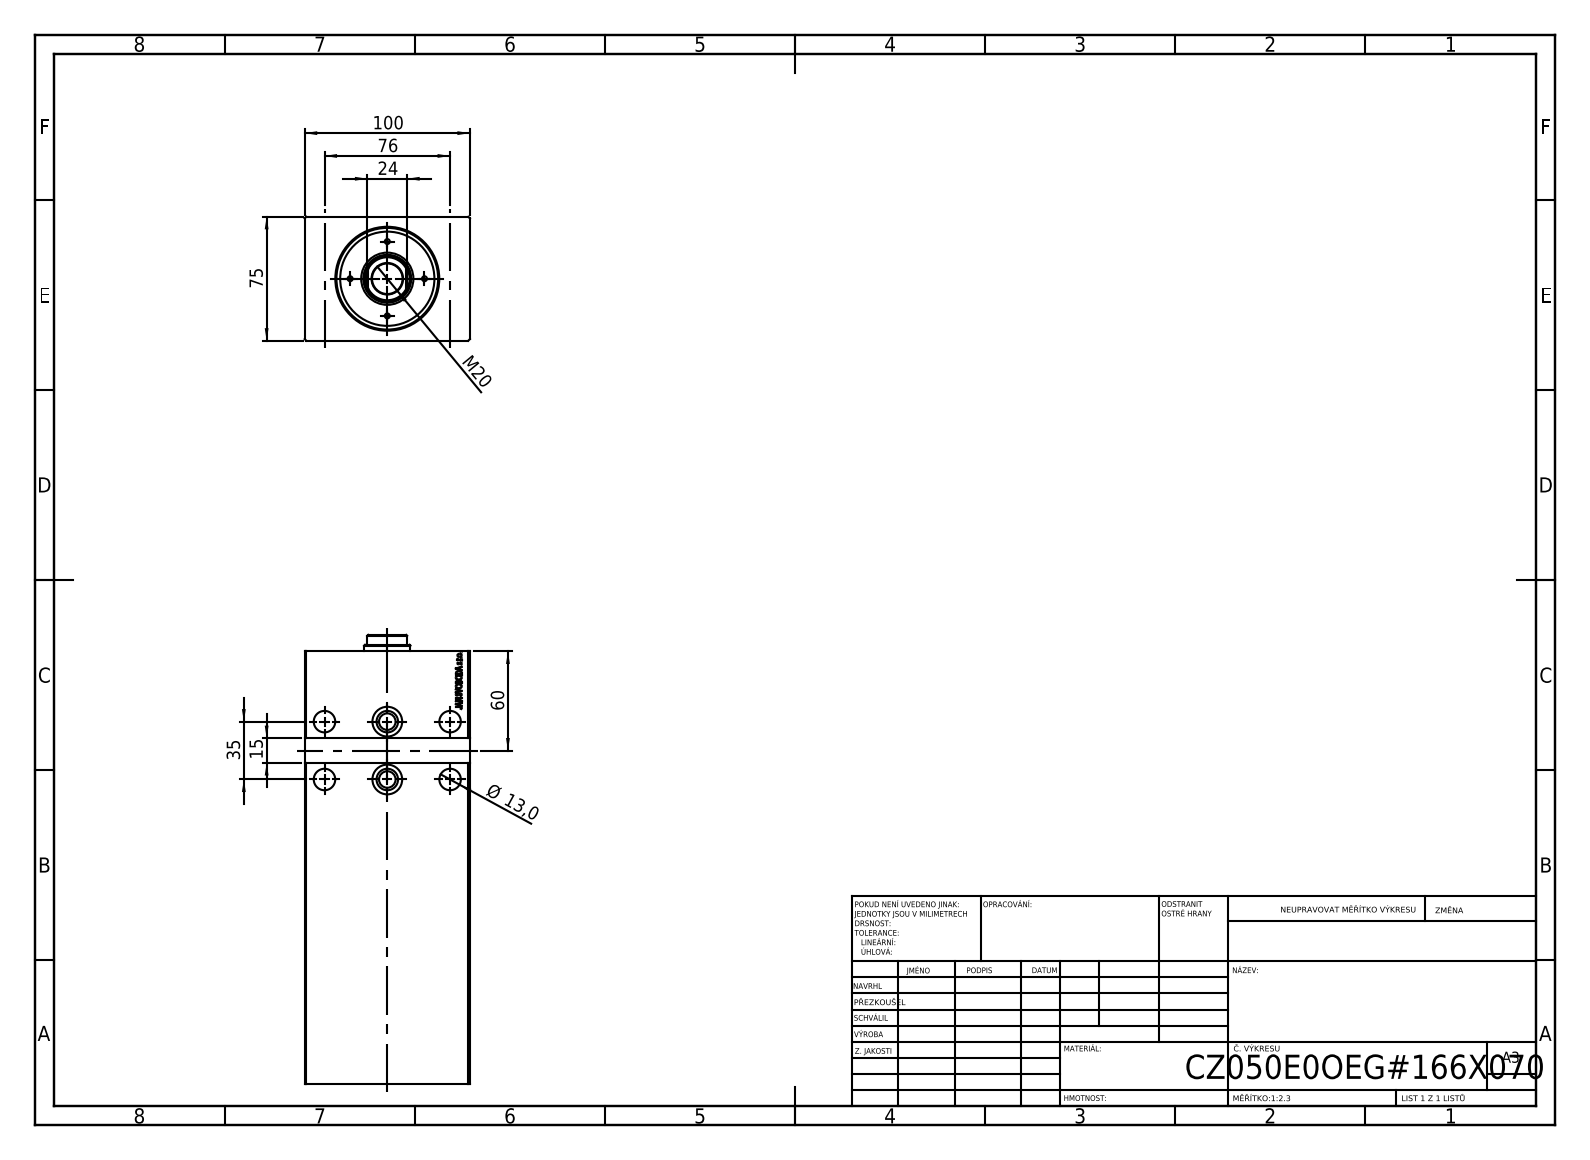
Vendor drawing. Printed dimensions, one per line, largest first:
100
76
75
60
35
24
M20
15
Ø 13,0
